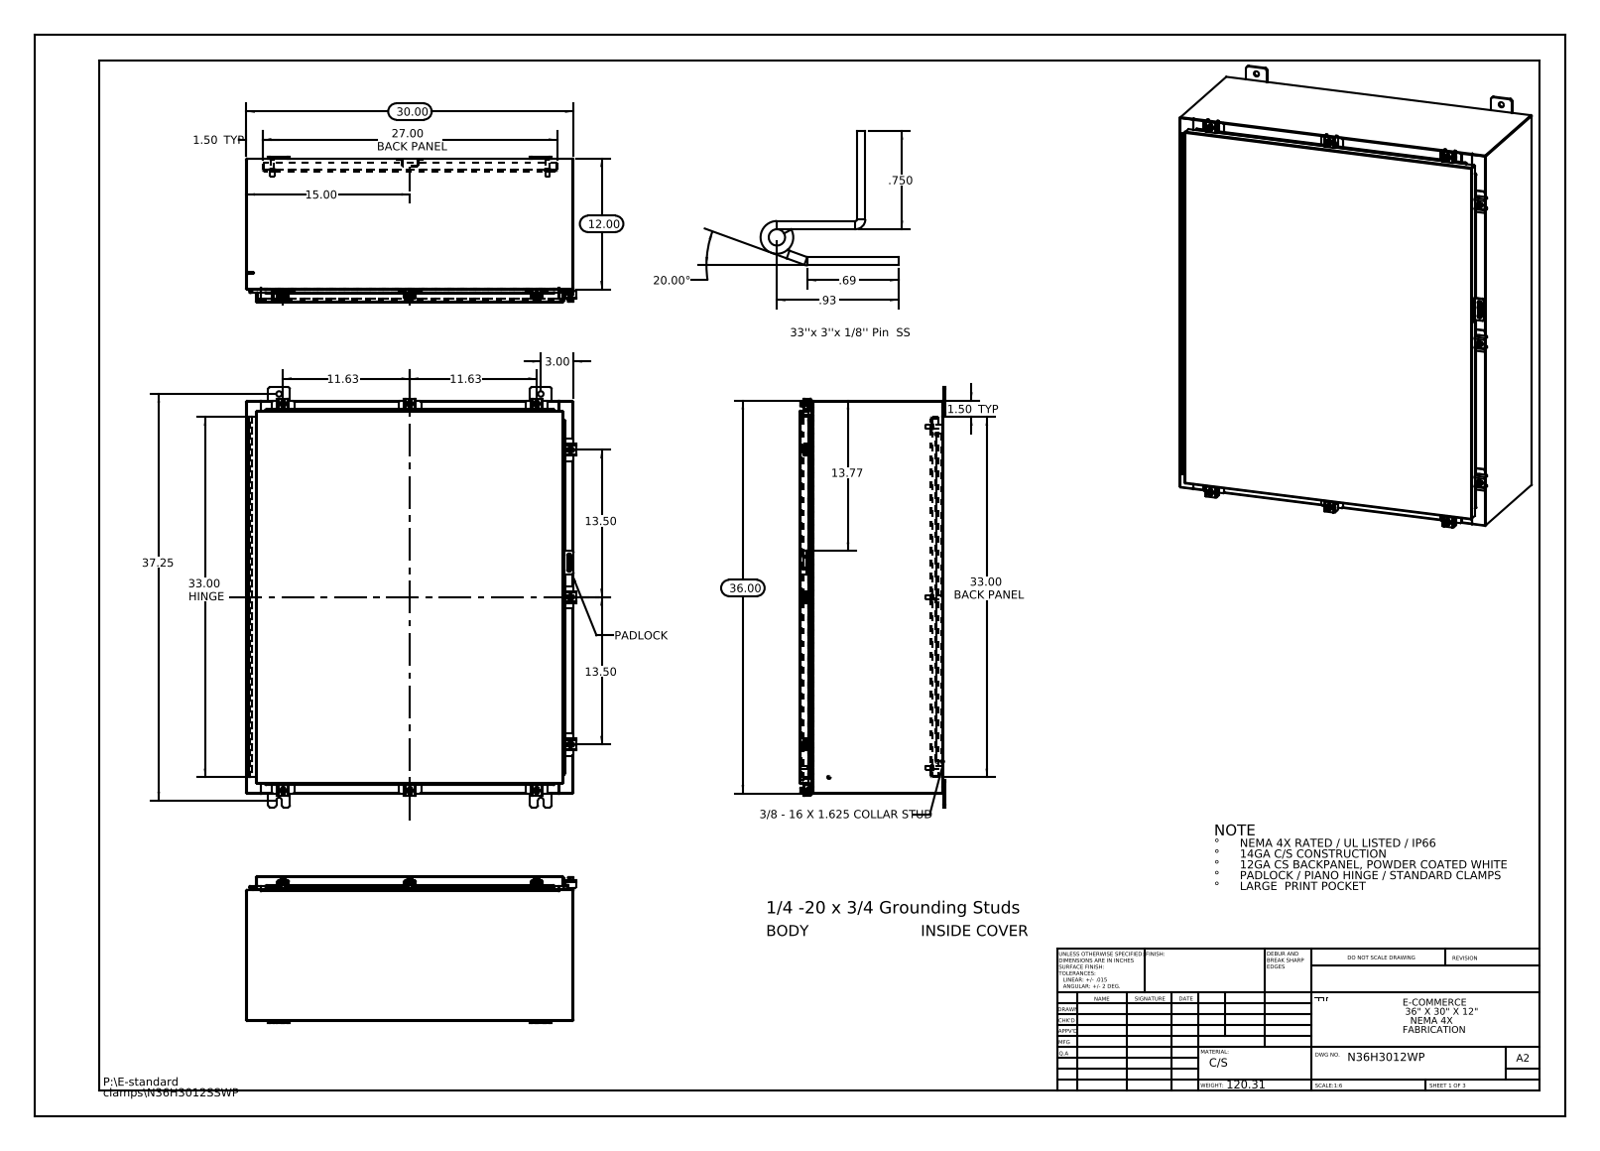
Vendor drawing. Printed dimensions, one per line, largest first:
37.25
36.00
33.00 HINGE
33.00 BACK PANEL
30.00
27.00 BACK PANEL
20.00°
15.00
13.77
13.50
13.50
12.00
11.63
11.63
3.00
1.50 TYP
1.50 TYP
.93
.750
.69
